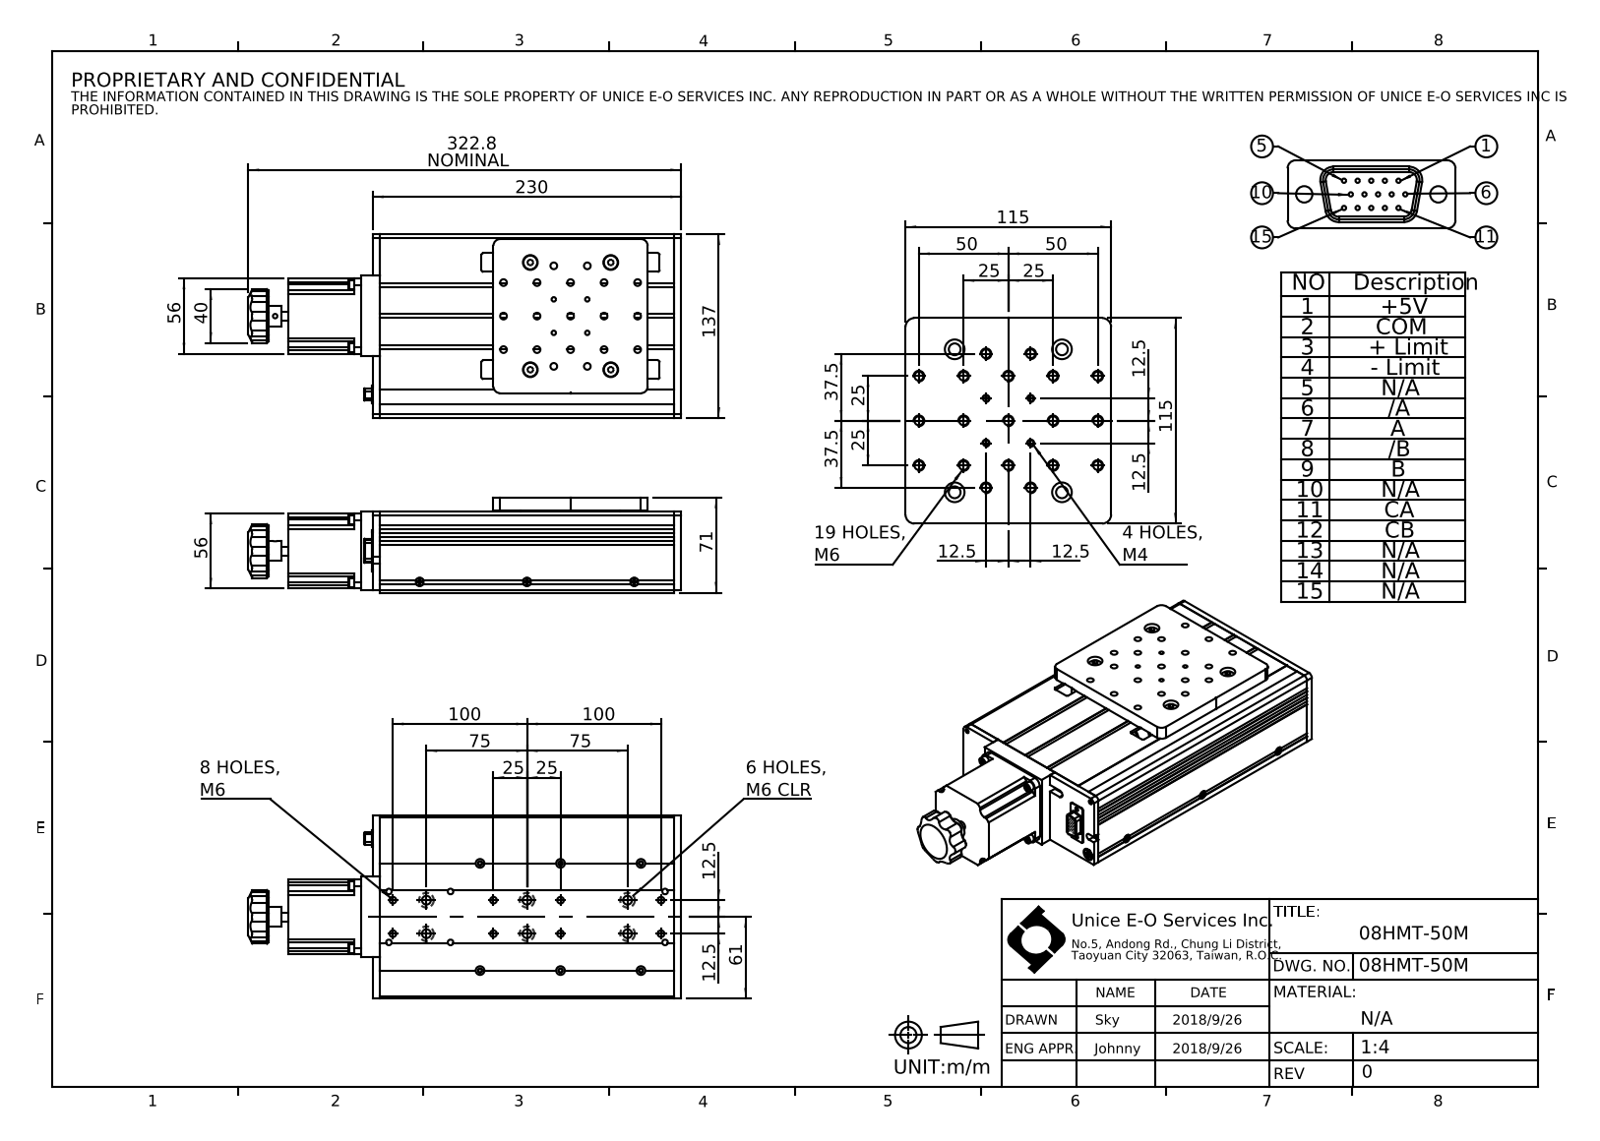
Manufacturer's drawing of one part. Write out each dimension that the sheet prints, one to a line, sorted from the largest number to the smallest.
322.8 NOMINAL
230
137
115
115
100
100
75
75
71
61
56
56
50
50
40
37.5
37.5
25
25
25
25
25
25
12.5
12.5
12.5
12.5
12.5
12.5
